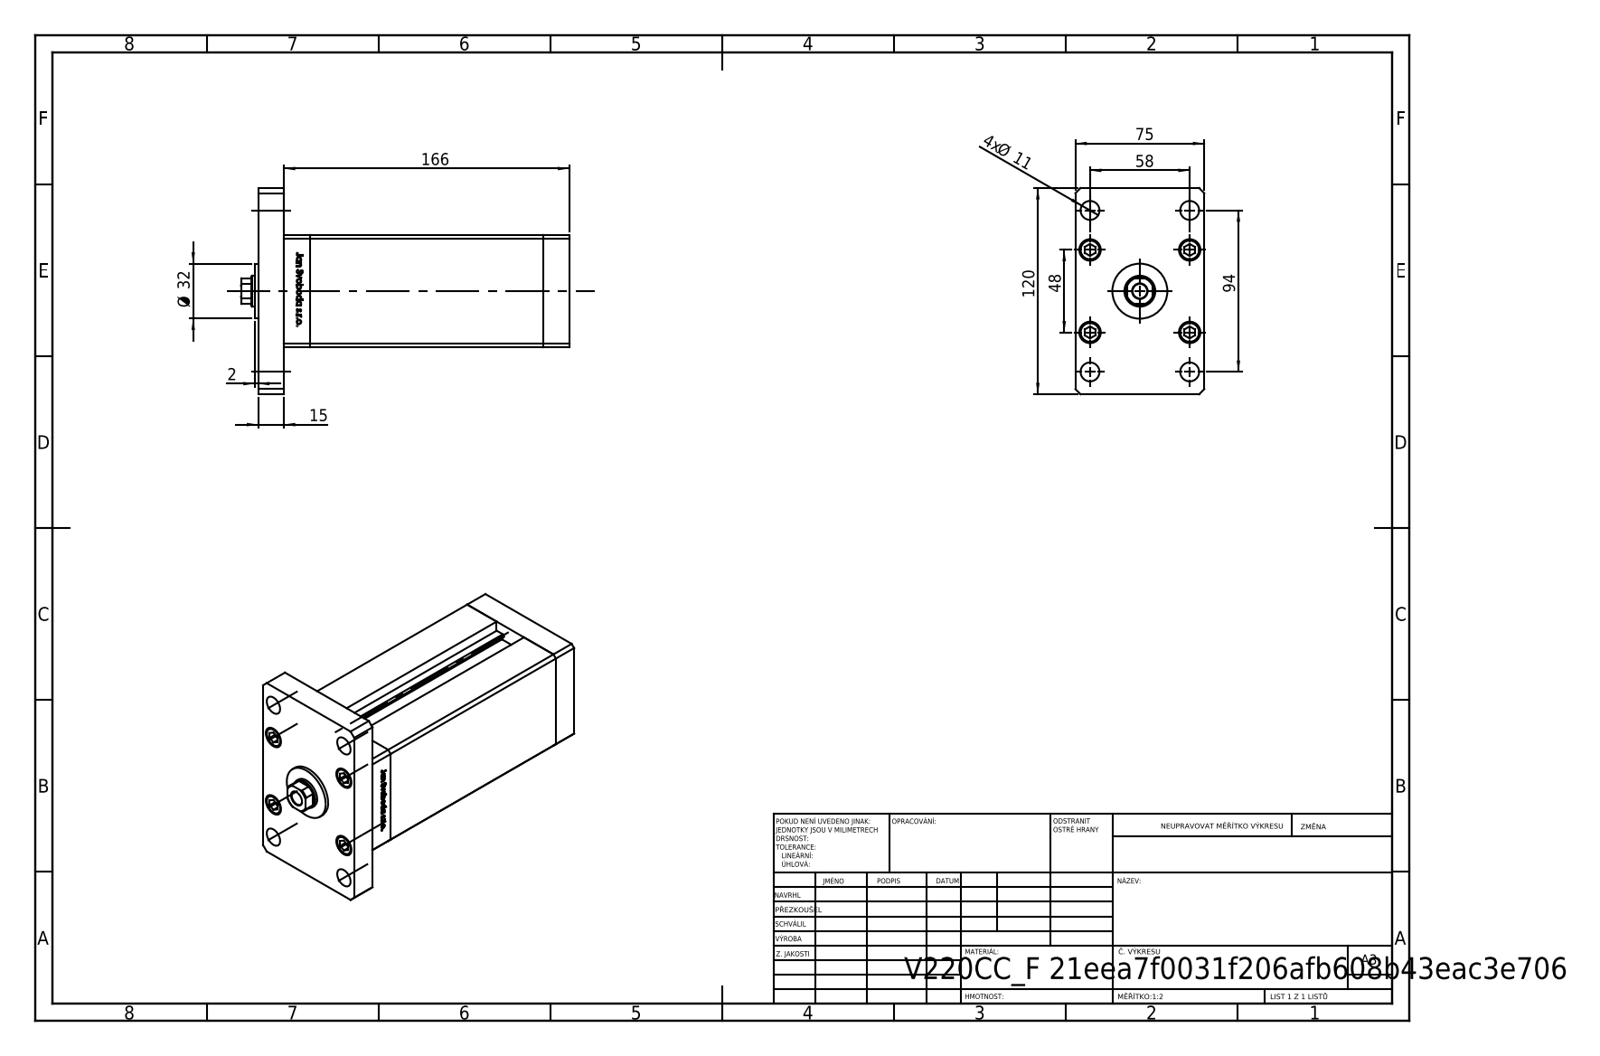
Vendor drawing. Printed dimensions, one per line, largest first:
166
120
94
75
58
48
Ø 32
15
4x Ø 11
2
